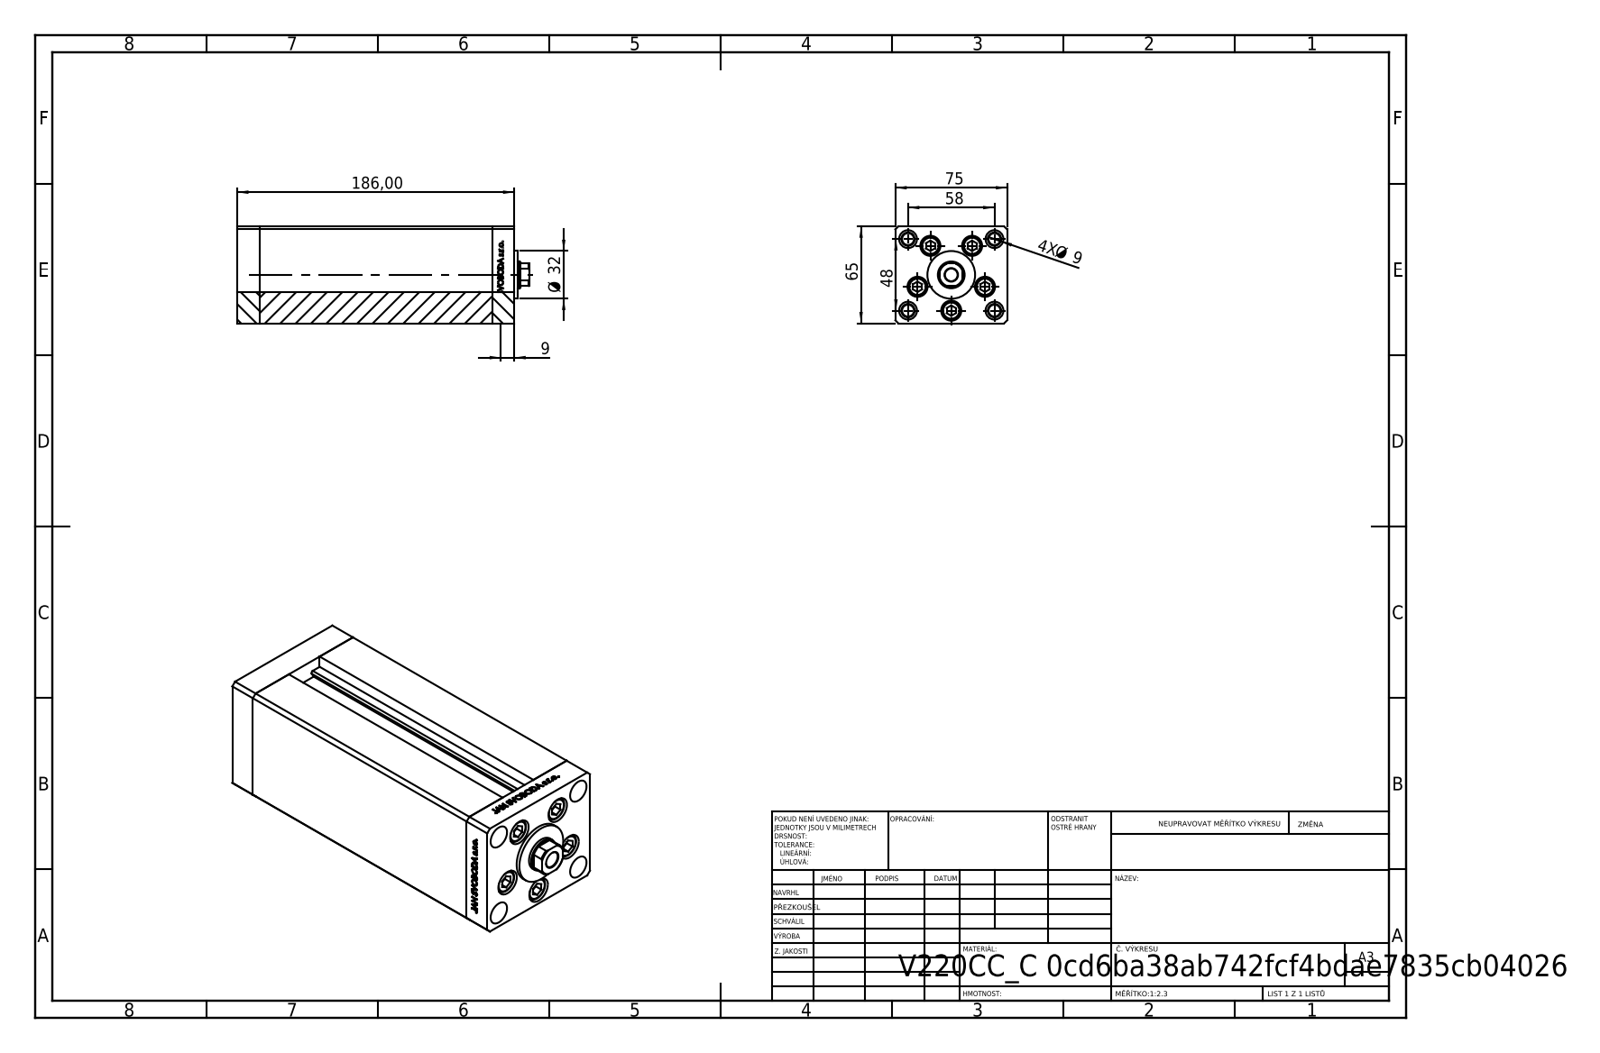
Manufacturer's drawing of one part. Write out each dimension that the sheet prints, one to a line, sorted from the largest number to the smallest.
186,00
75
65
58
48
Ø 32
9
4X Ø 9
